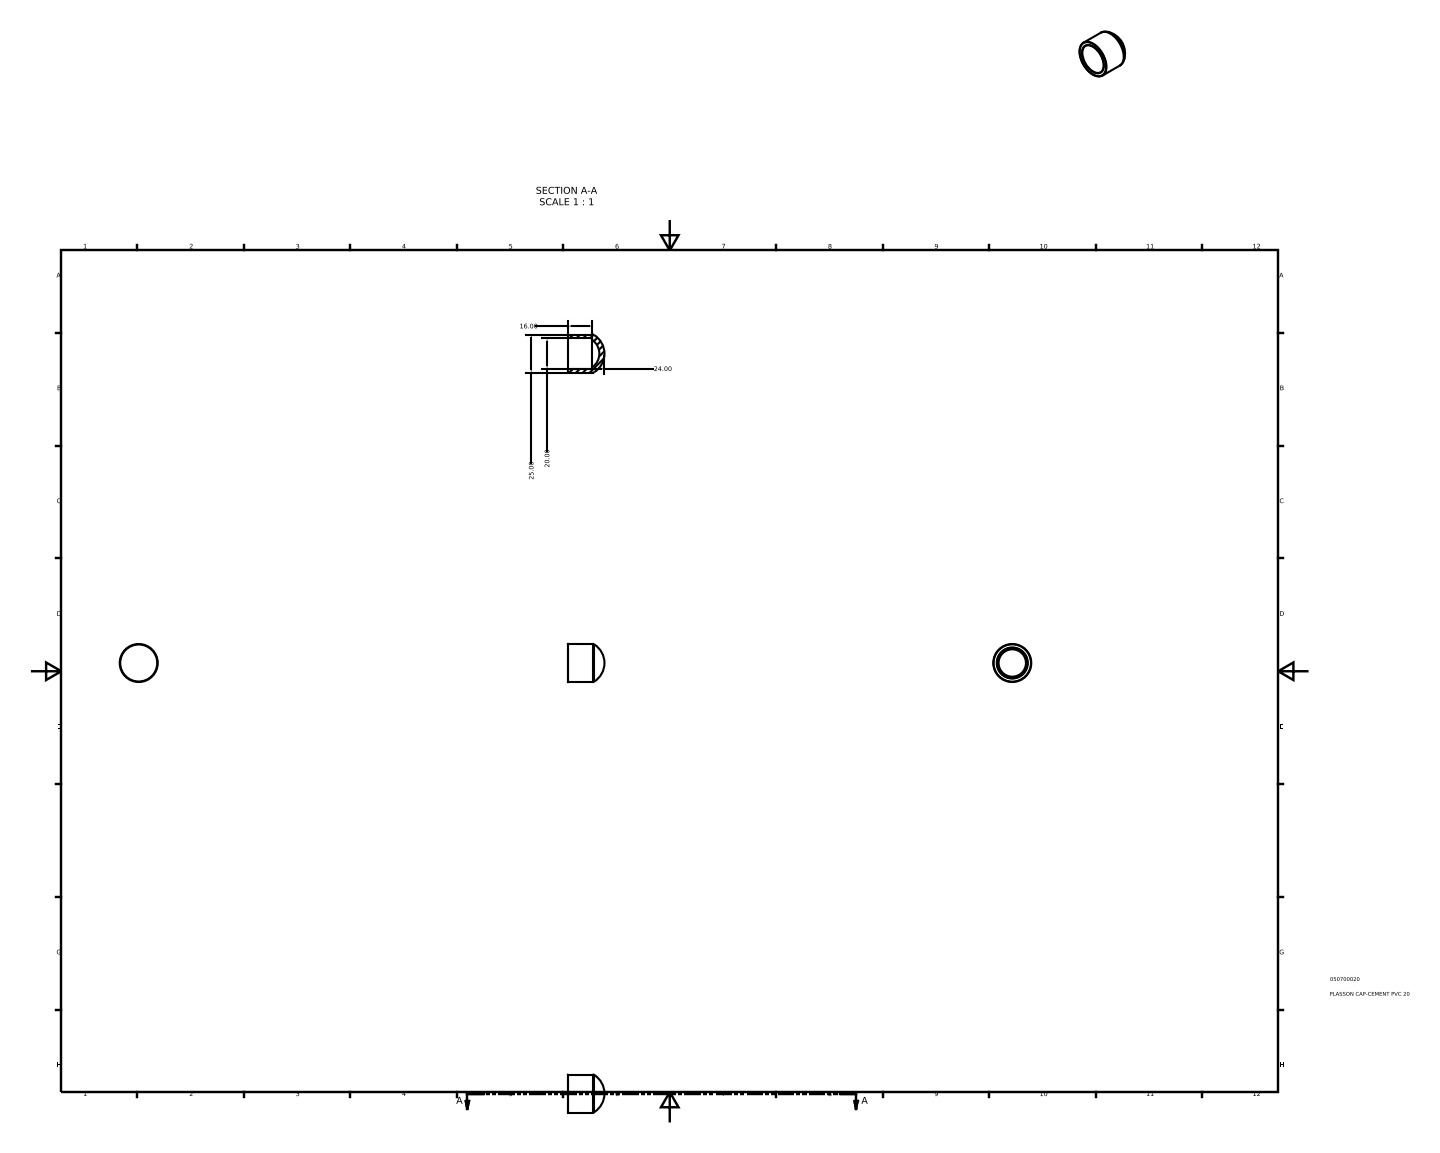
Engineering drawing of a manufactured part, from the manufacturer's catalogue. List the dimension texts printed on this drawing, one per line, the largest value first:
25.00
24.00
20.00
16.00
